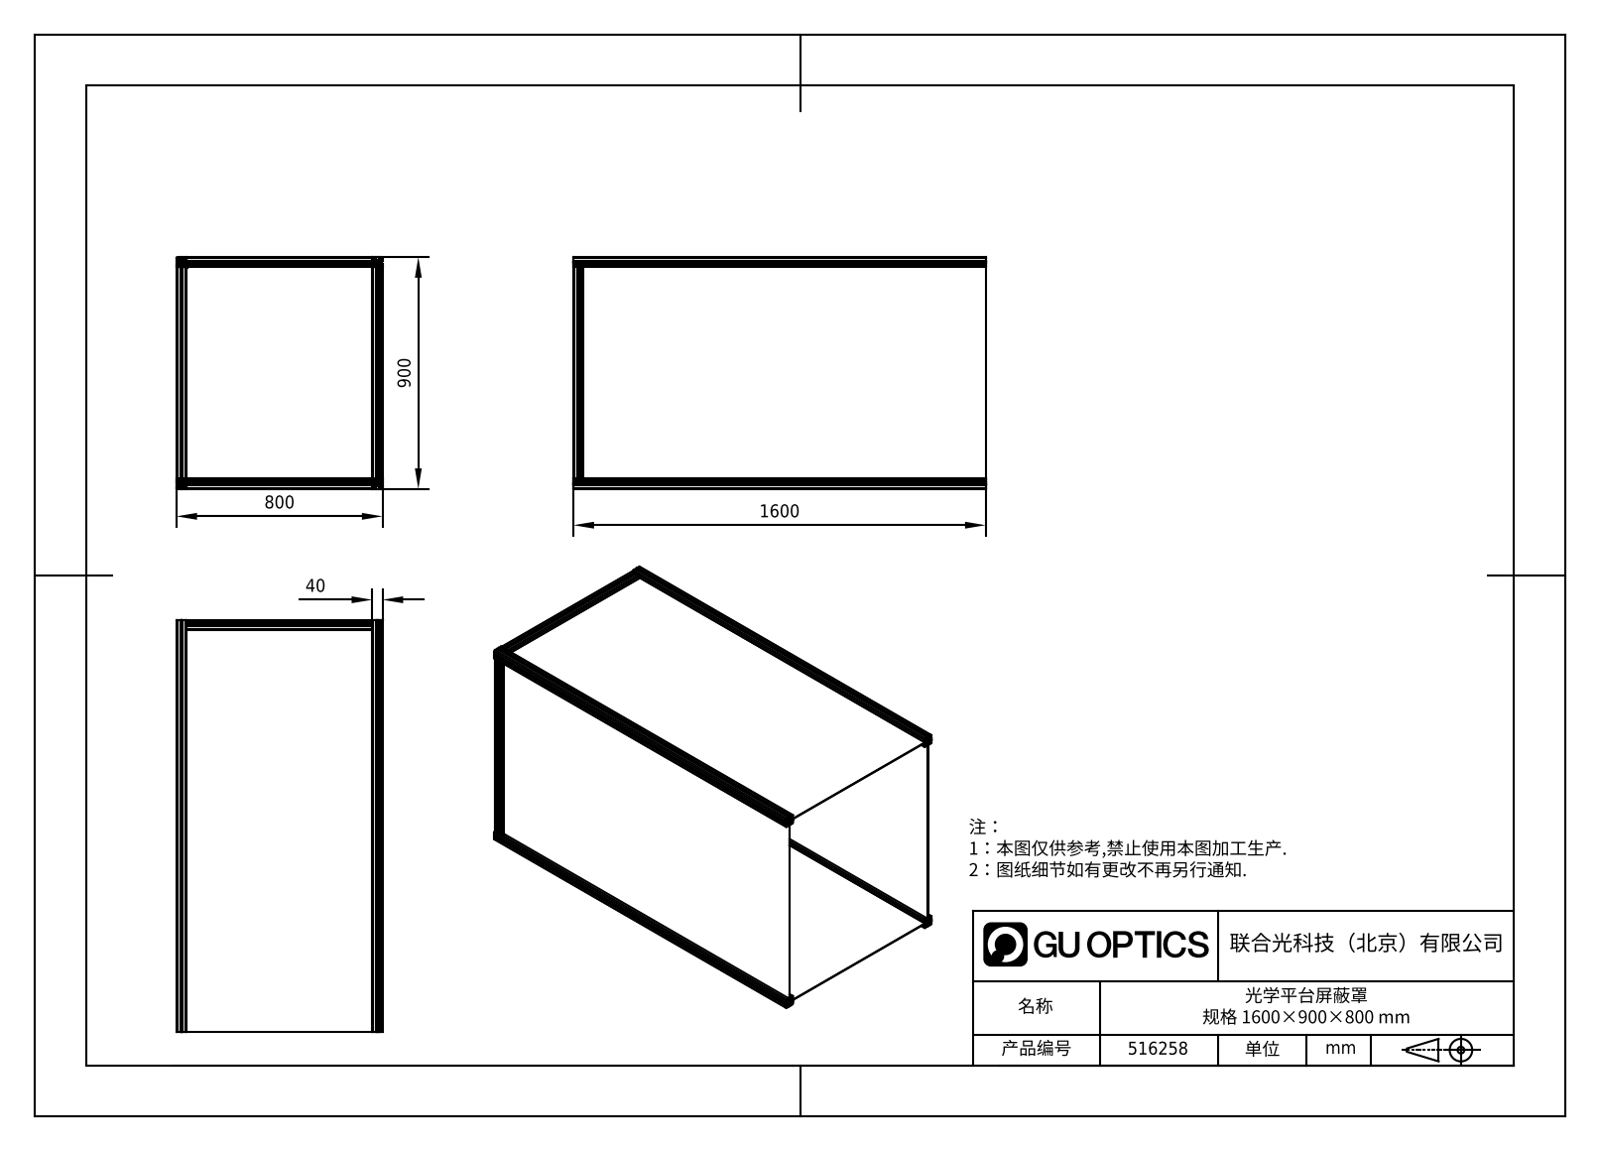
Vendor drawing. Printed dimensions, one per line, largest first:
1600
900
800
40
